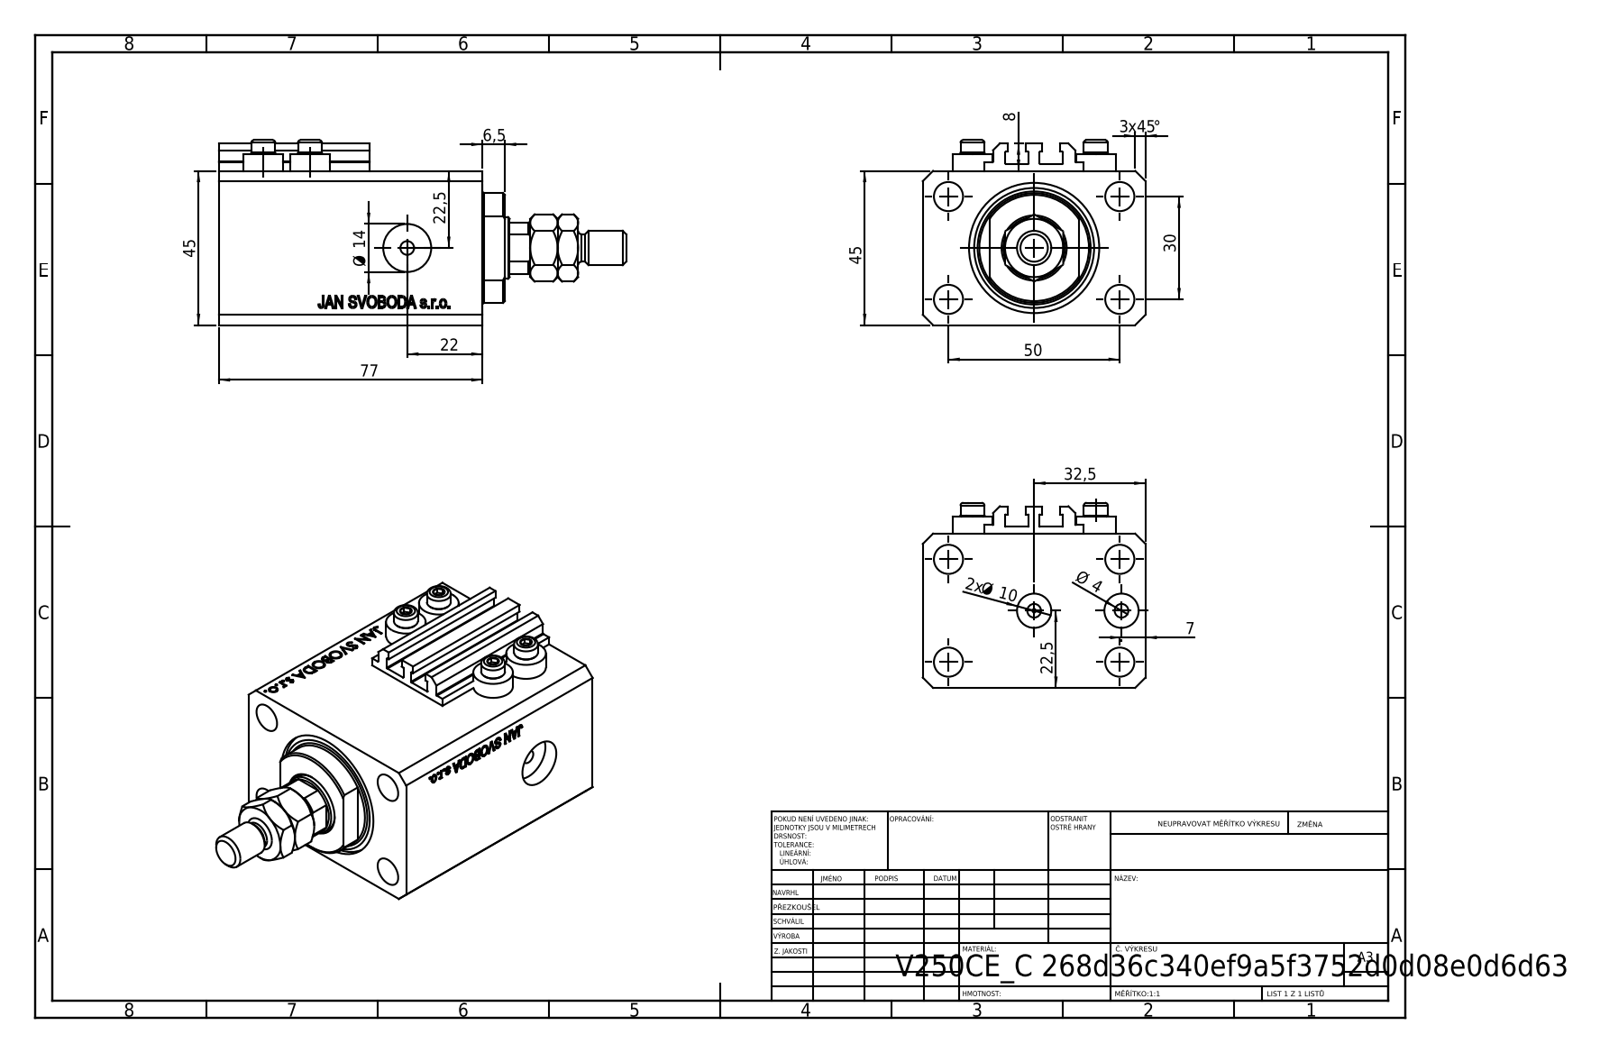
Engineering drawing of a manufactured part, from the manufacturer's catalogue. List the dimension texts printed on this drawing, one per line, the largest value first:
77
50
45
3 x45 °
45
32,5
30
22,5
22,5
22
Ø 14
2x Ø 10
8
7
6,5
Ø 4
